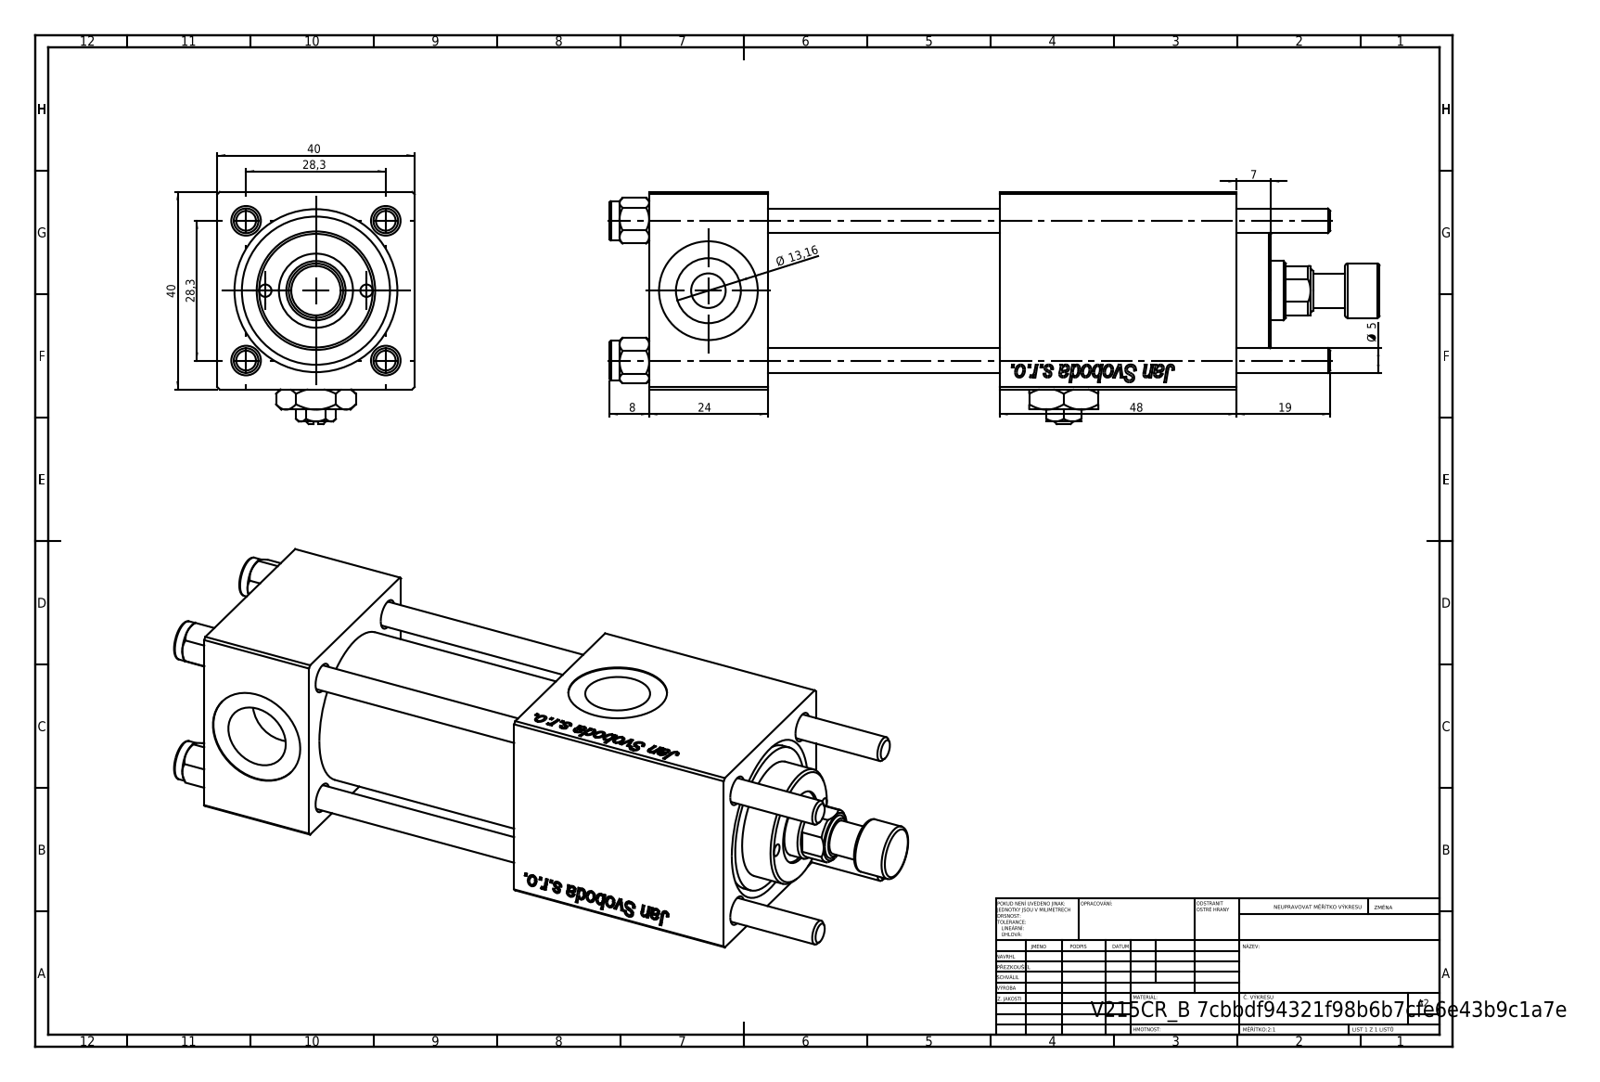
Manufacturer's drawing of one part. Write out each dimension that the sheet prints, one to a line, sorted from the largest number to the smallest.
48
40
40
28,3
28,3
24
19
Ø 13,16
8
7
Ø 5
